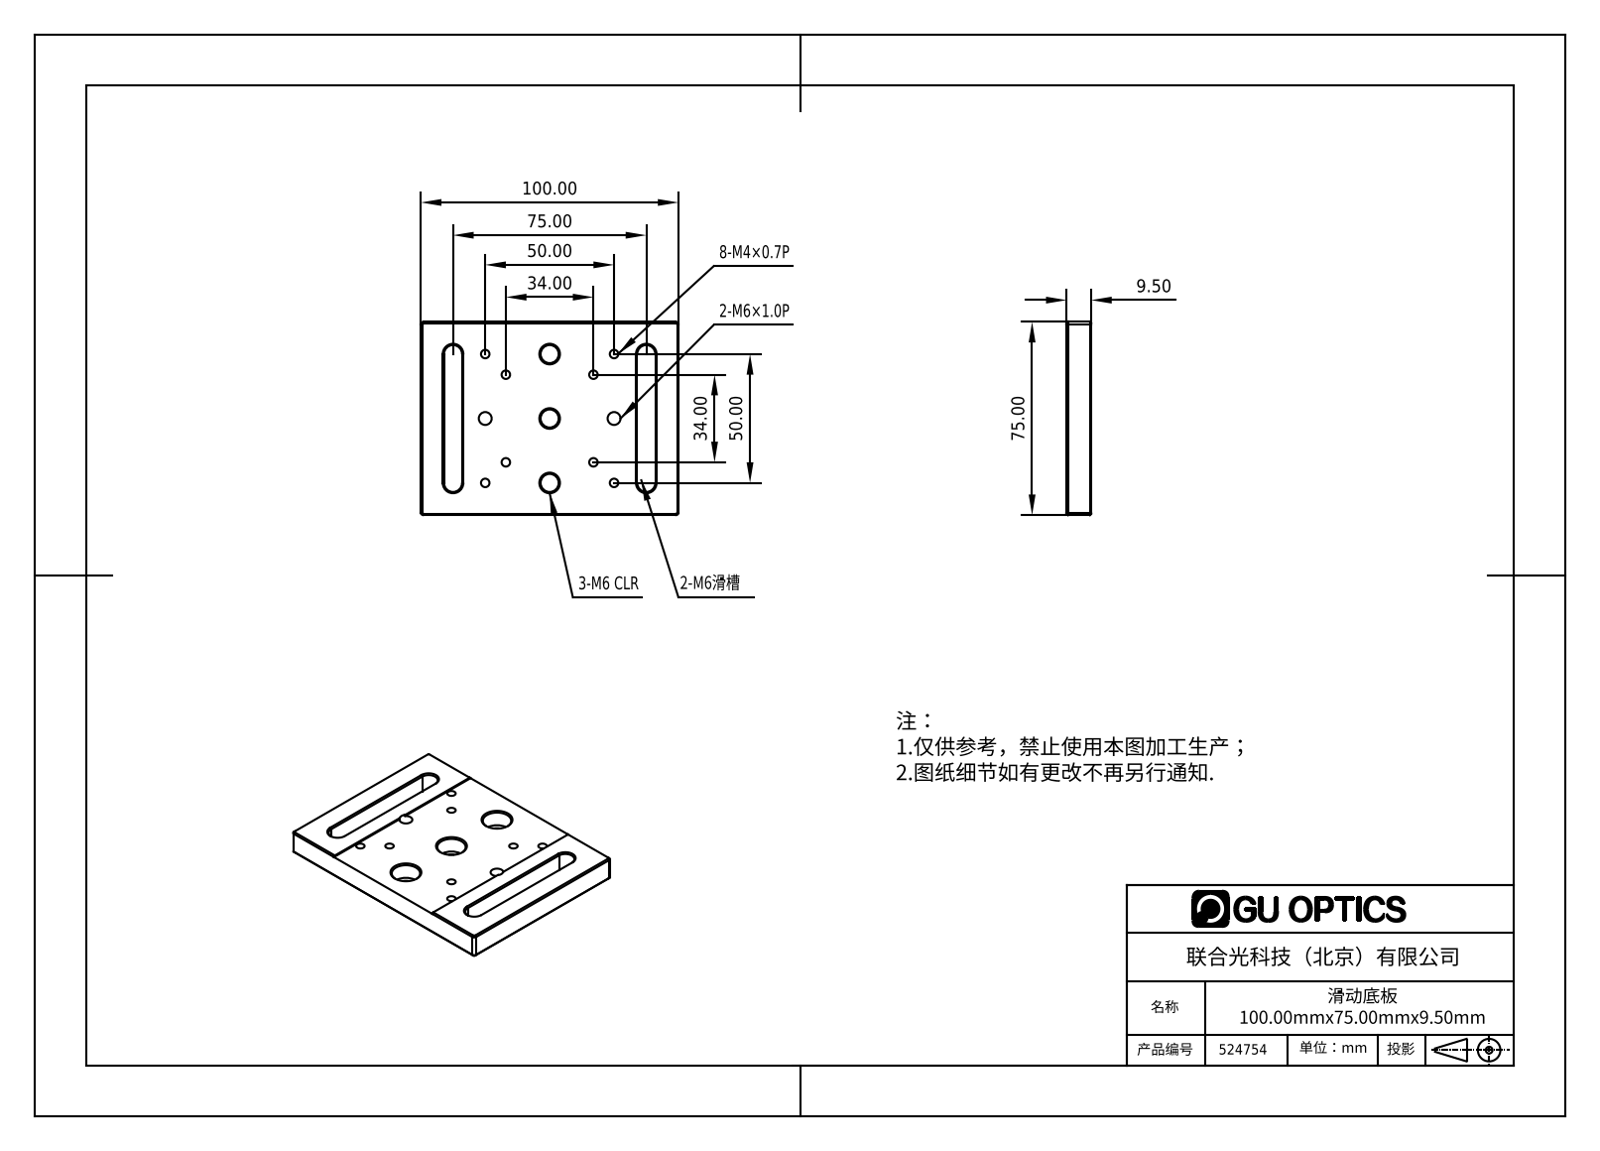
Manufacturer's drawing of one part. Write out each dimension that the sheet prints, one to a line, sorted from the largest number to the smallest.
100.00
75.00
75.00
50.00
50.00
34.00
34.00
9.50
